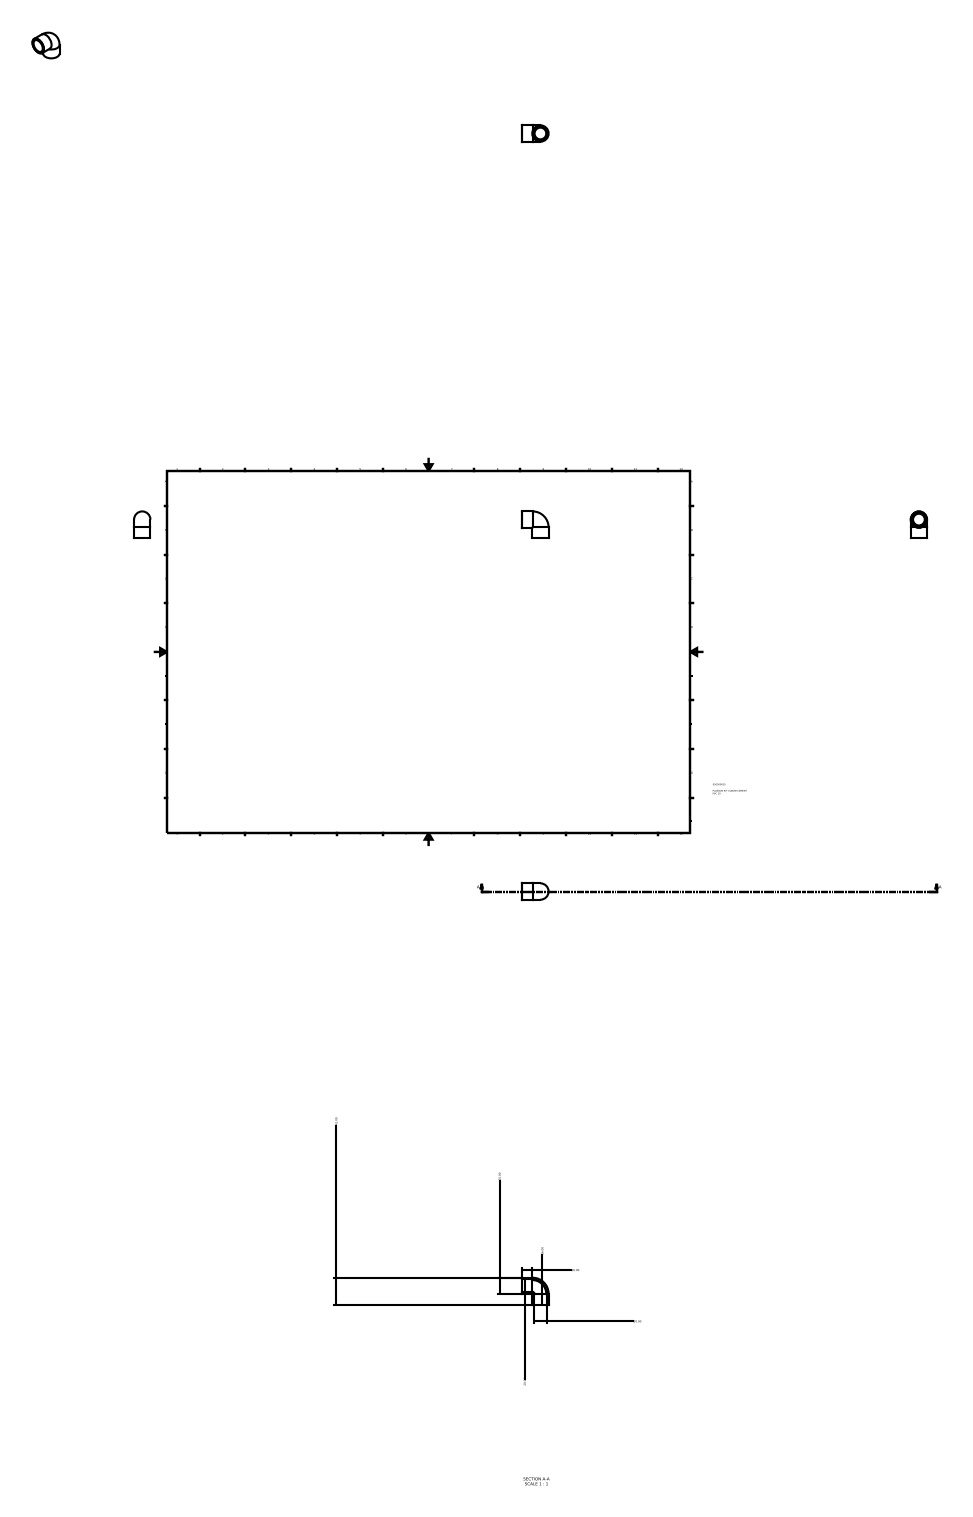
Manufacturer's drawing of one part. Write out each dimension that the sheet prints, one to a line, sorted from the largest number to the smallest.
41.00
25.00
20.00
20.00
16.00
16.00
